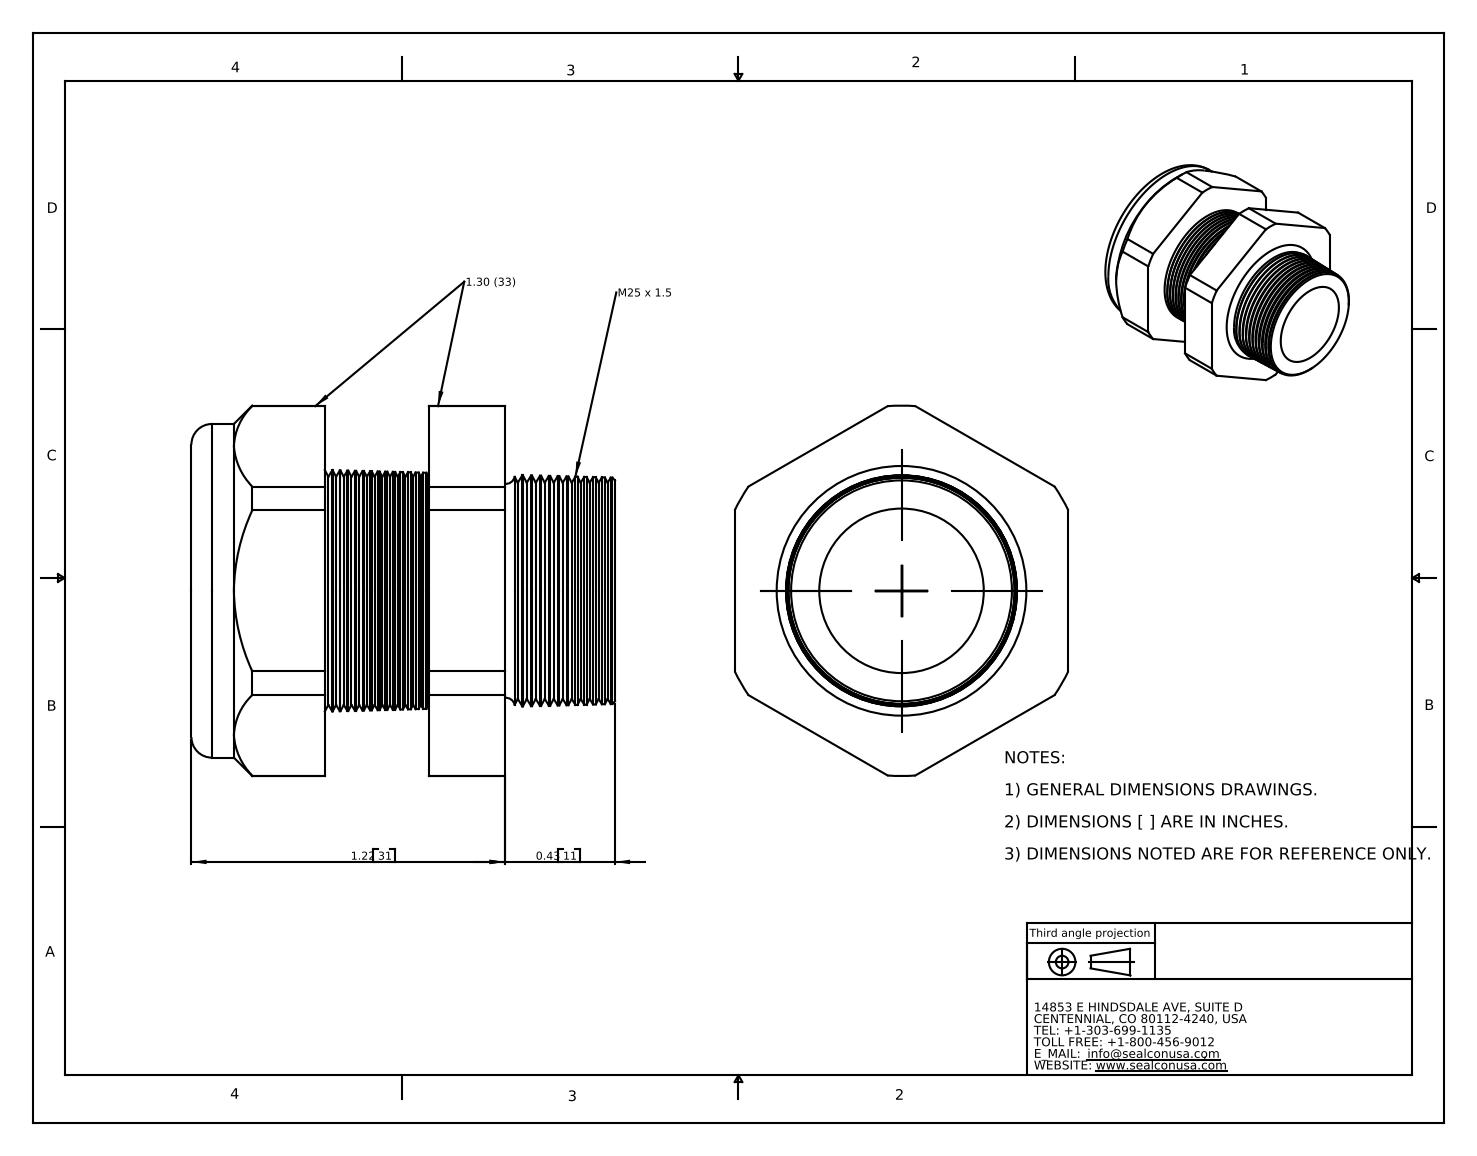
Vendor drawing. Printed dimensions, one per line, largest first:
1.22 31
0.43 11
